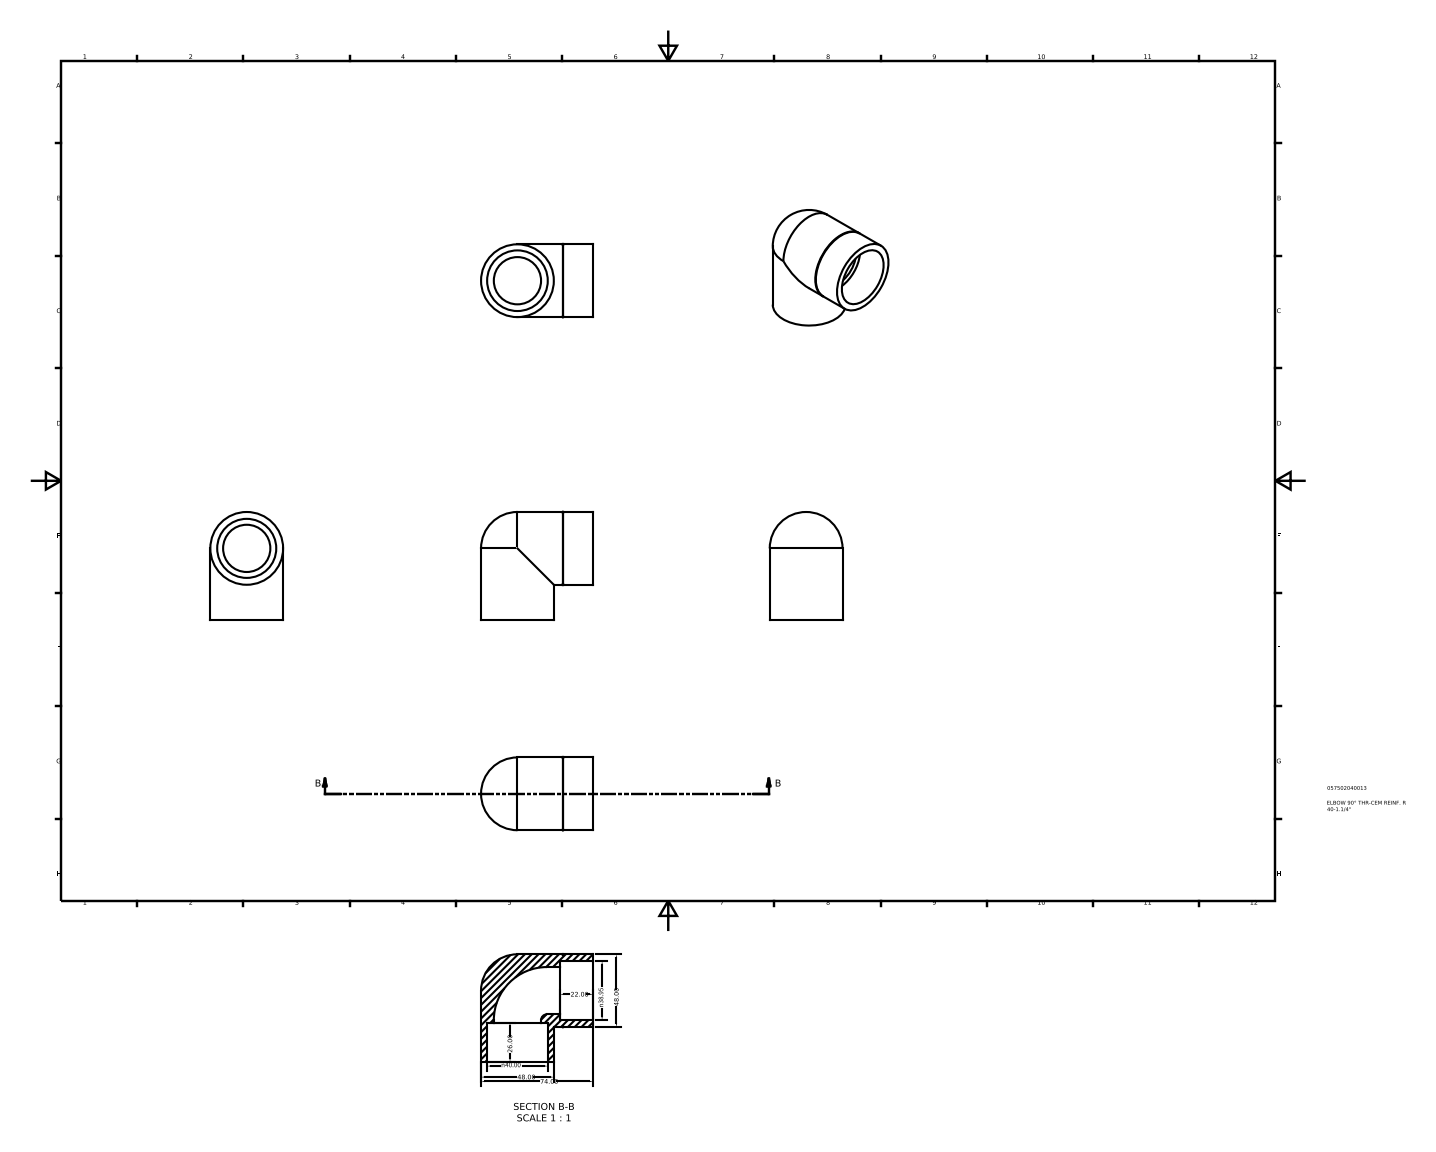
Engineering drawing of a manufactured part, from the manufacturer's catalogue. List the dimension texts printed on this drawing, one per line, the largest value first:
74.00
48.00
48.00
n40.00
n38.95
26.00
22.00
